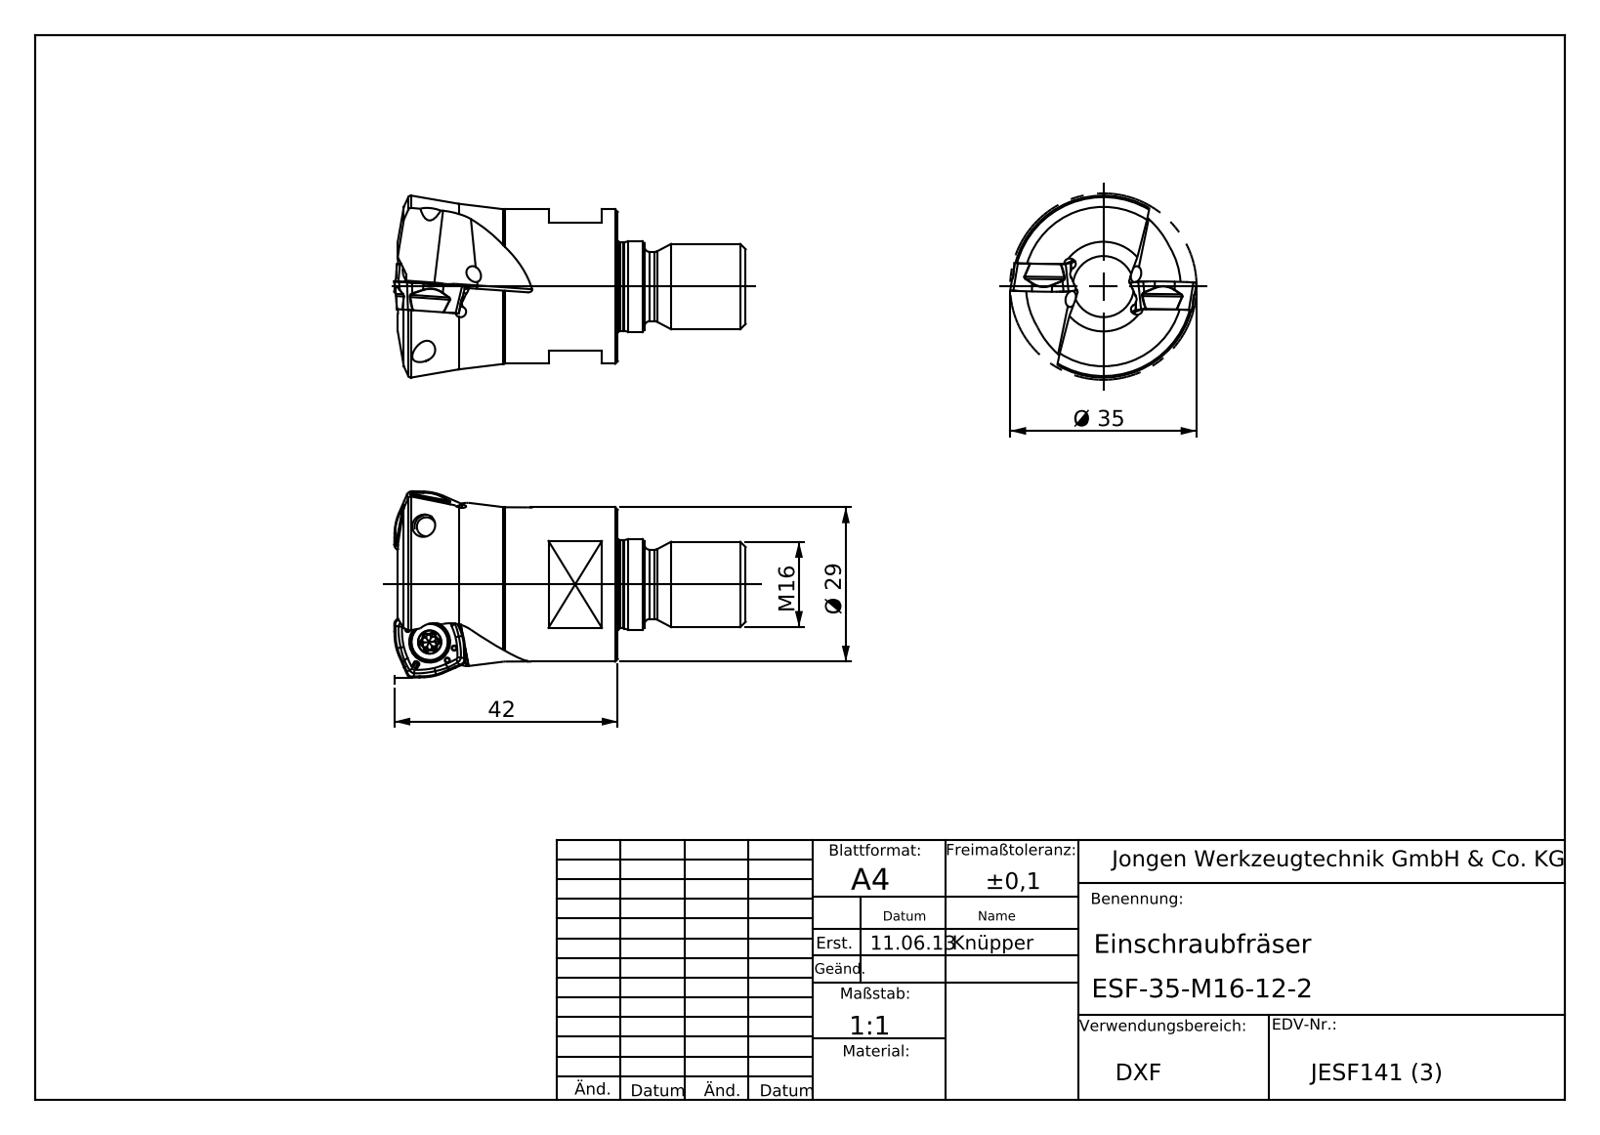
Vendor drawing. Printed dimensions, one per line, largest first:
42
Ø 35
Ø 29
M 16
